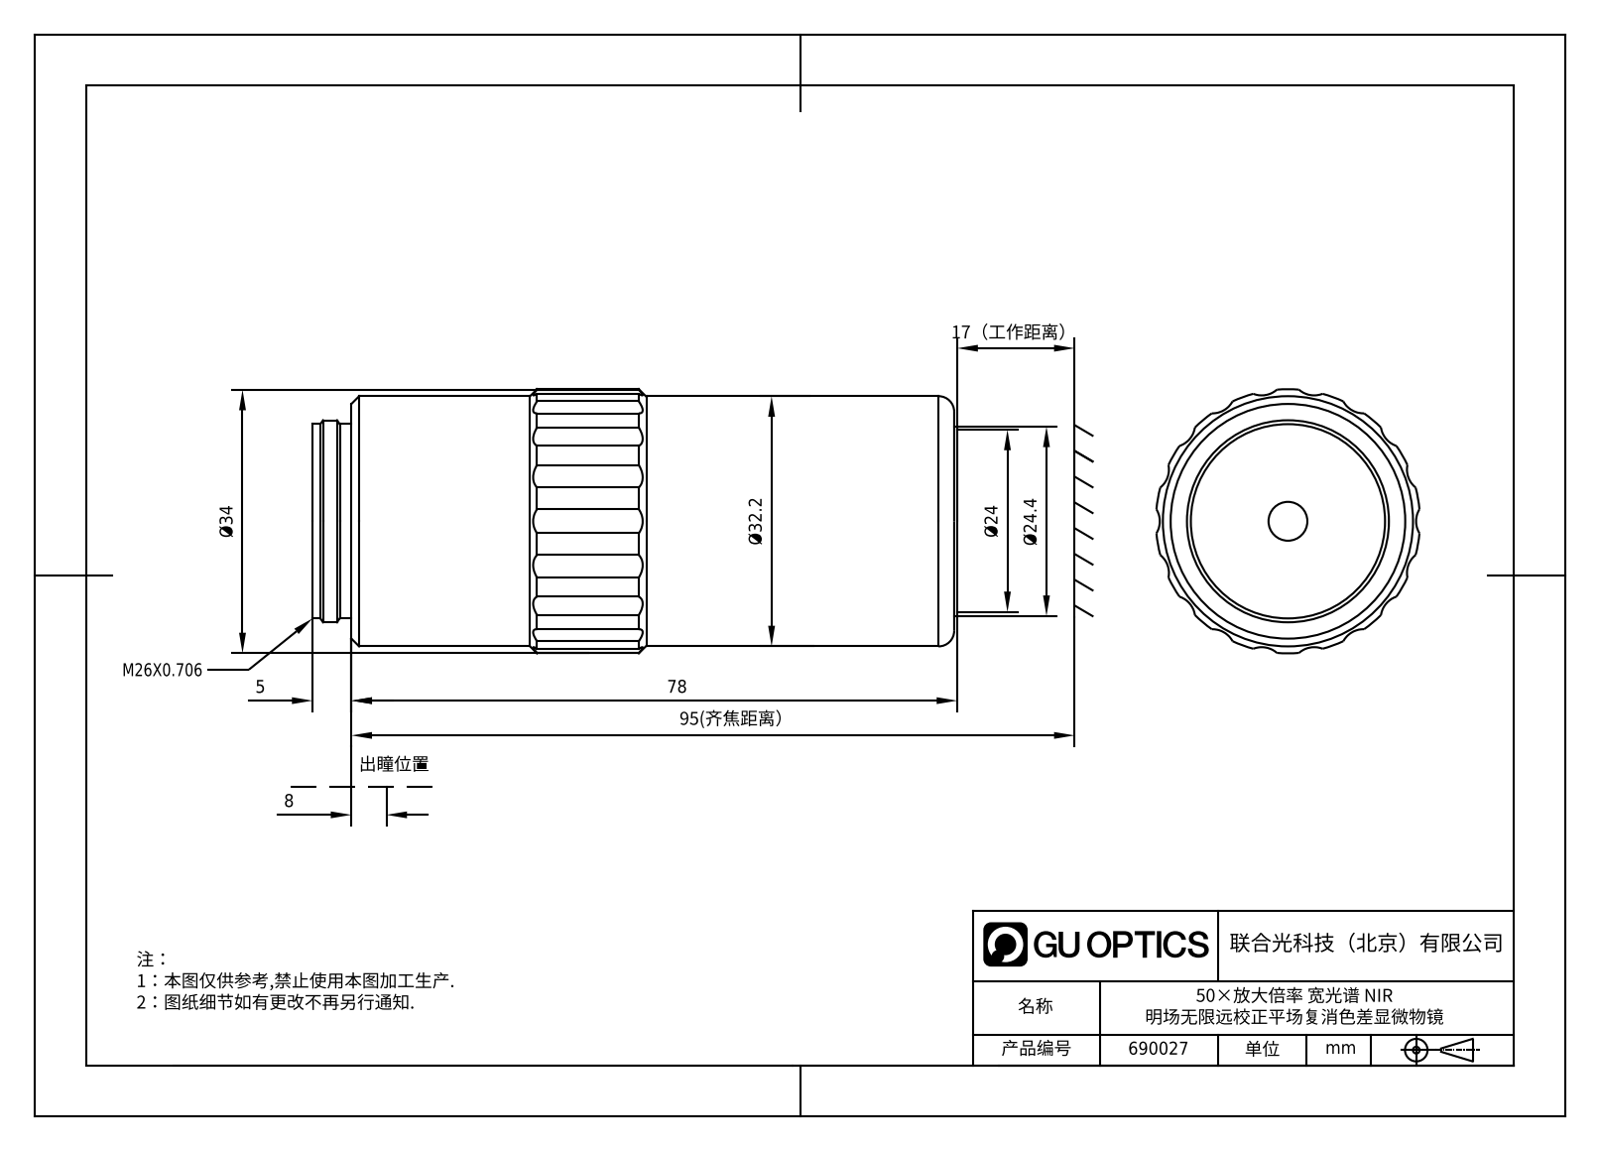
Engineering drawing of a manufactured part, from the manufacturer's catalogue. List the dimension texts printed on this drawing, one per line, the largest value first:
95(齐焦距离）
78
Ø34
Ø32.2
Ø24.4
Ø24
17（工作距离）
8
5
